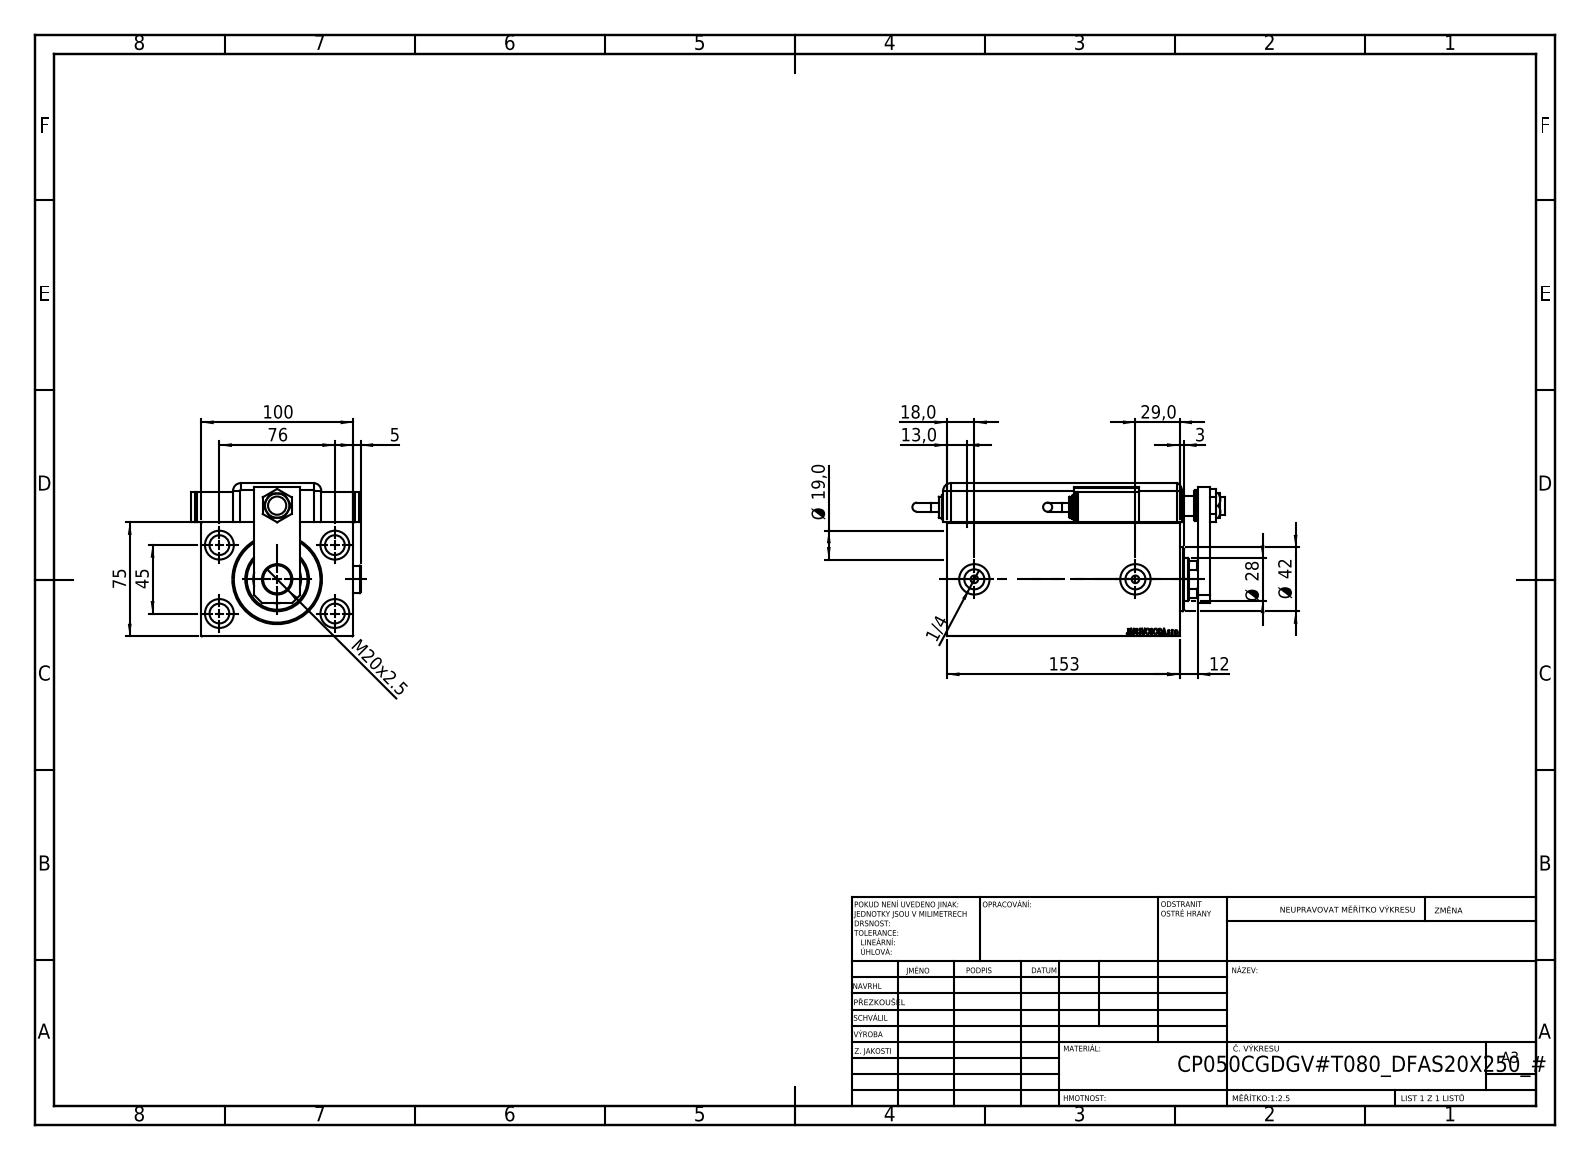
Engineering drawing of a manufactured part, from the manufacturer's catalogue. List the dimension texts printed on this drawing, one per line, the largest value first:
153
100
76
75
45
Ø 42
29,0
Ø 28
M20x2.5
Ø 19,0
18,0
13,0
12
5
3
1/4
